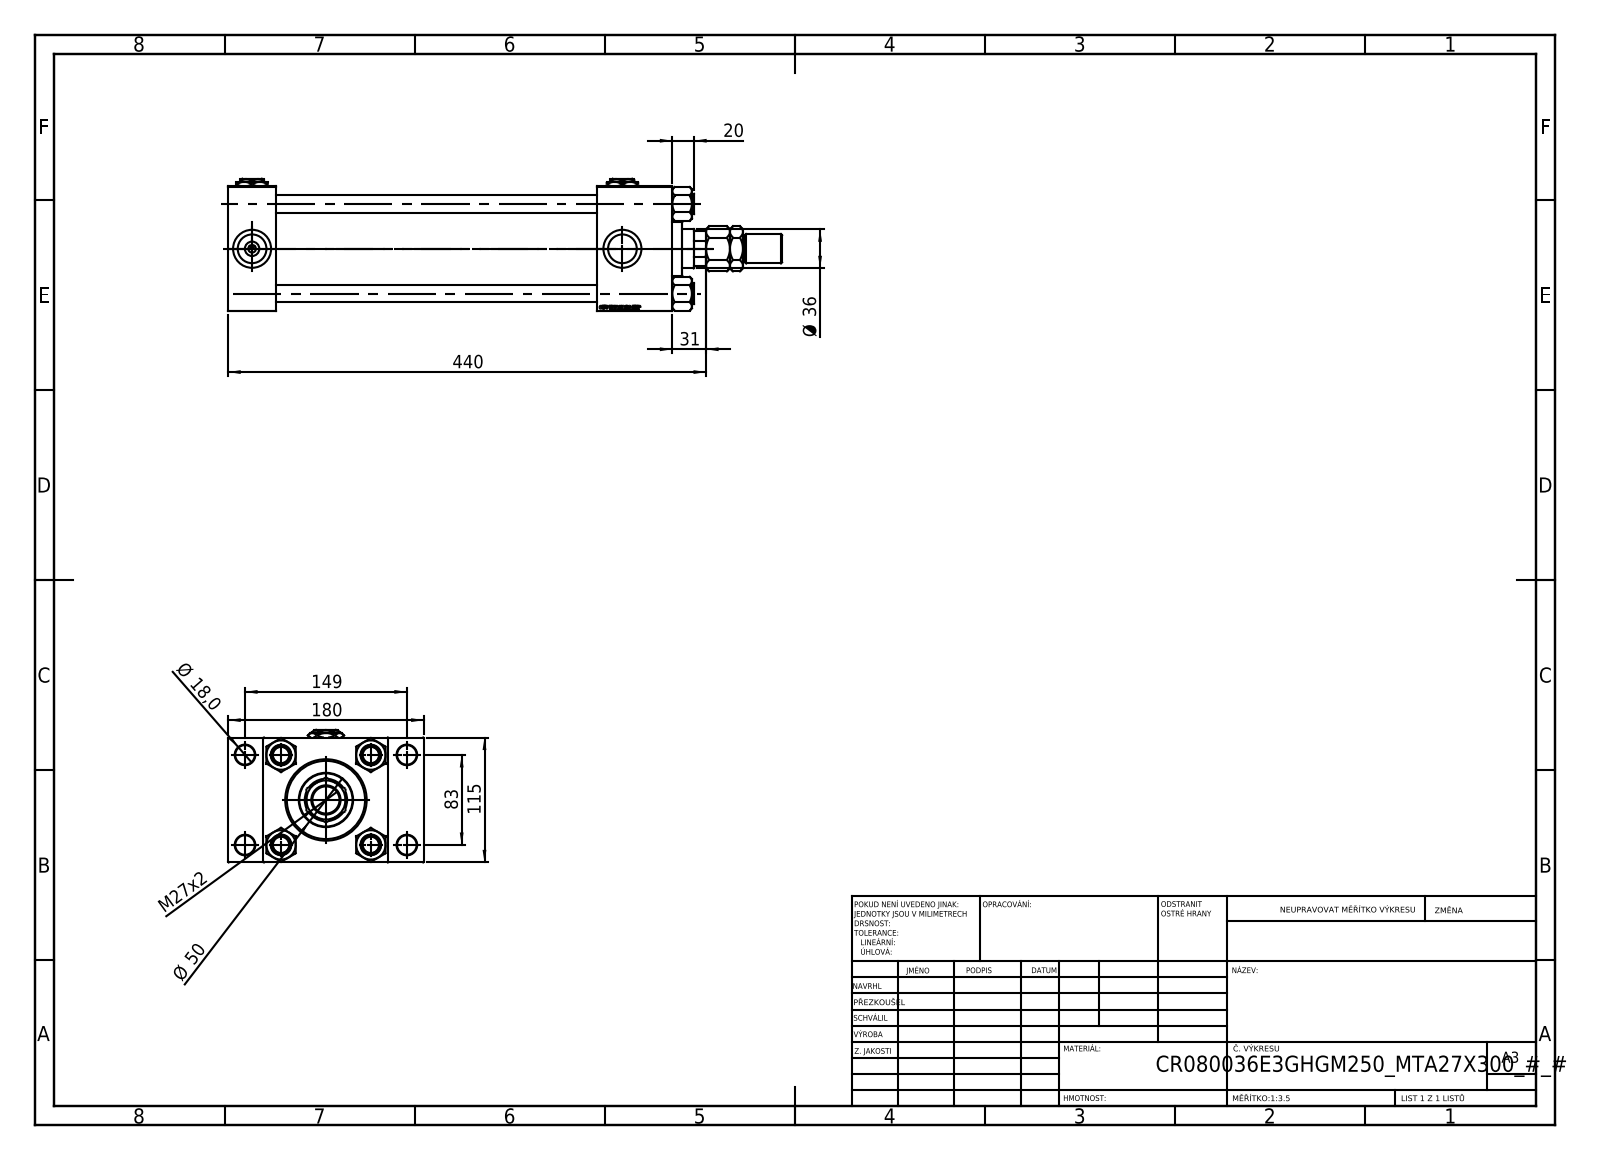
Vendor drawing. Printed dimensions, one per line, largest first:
440
180
149
115
83
Ø 50
Ø 36
31
M27x2
20
Ø 18,0
